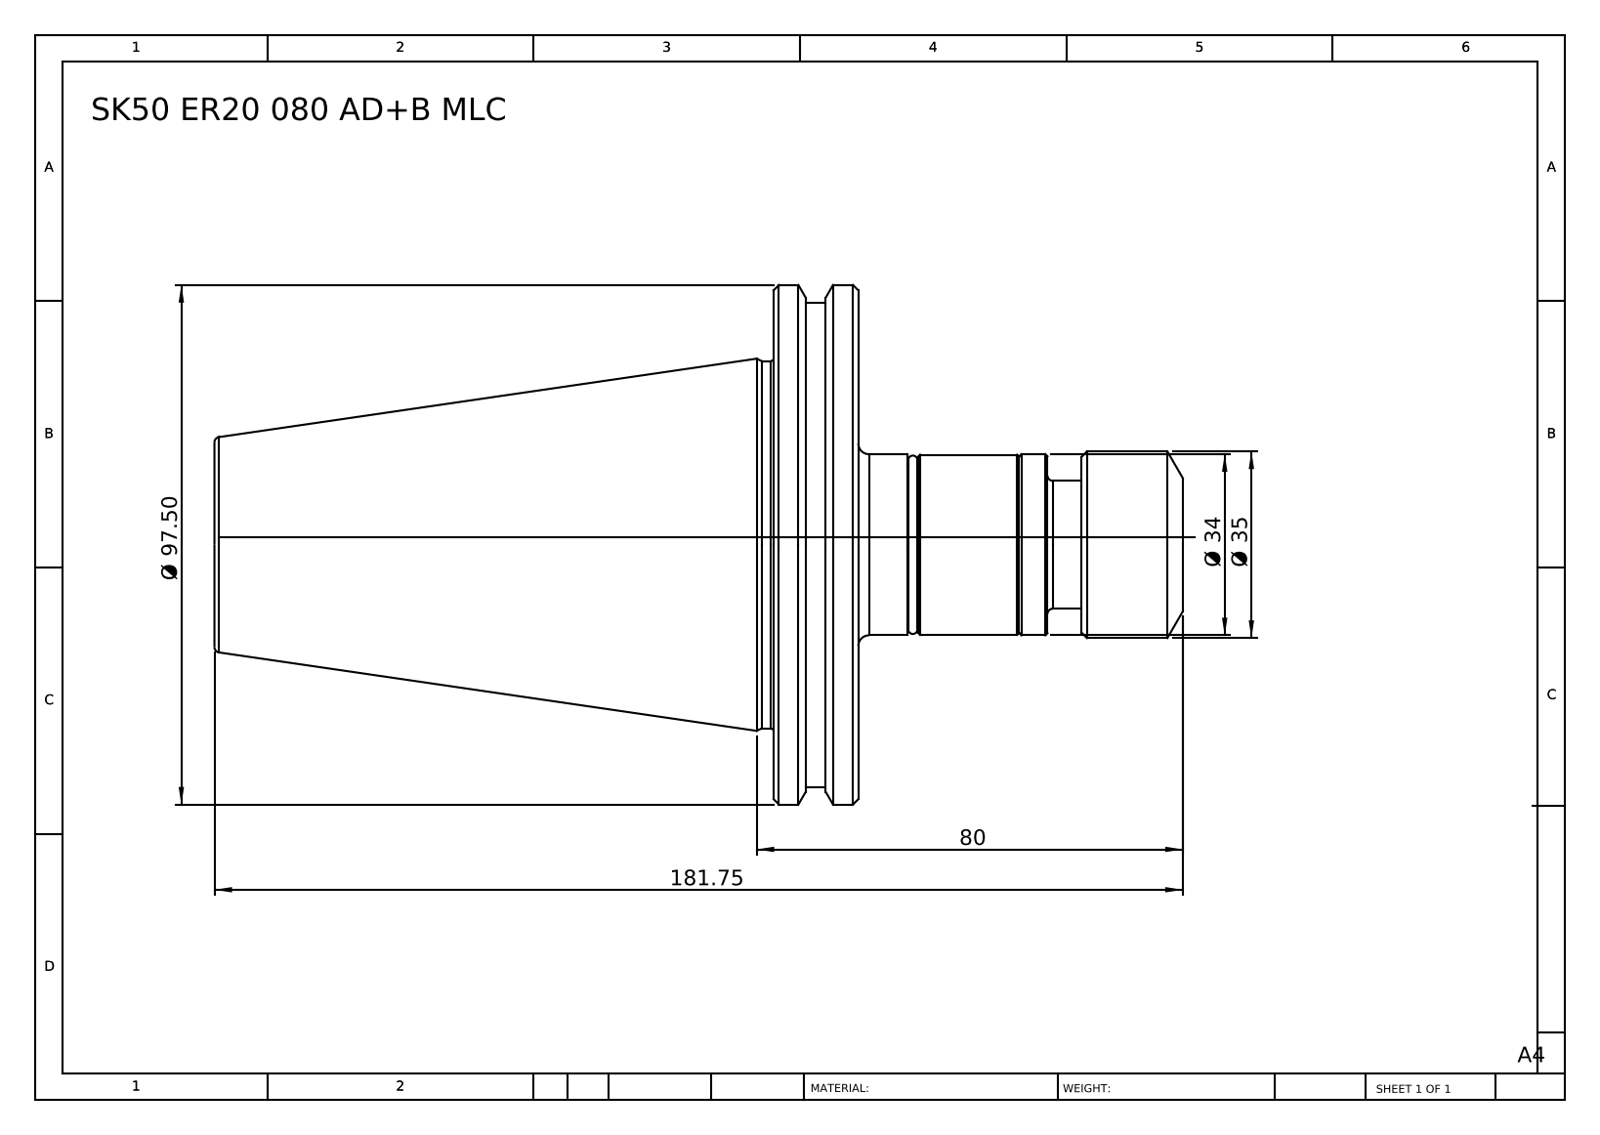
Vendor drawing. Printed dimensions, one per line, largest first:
181.75
Ø 97.50
80
Ø 35
Ø 34
